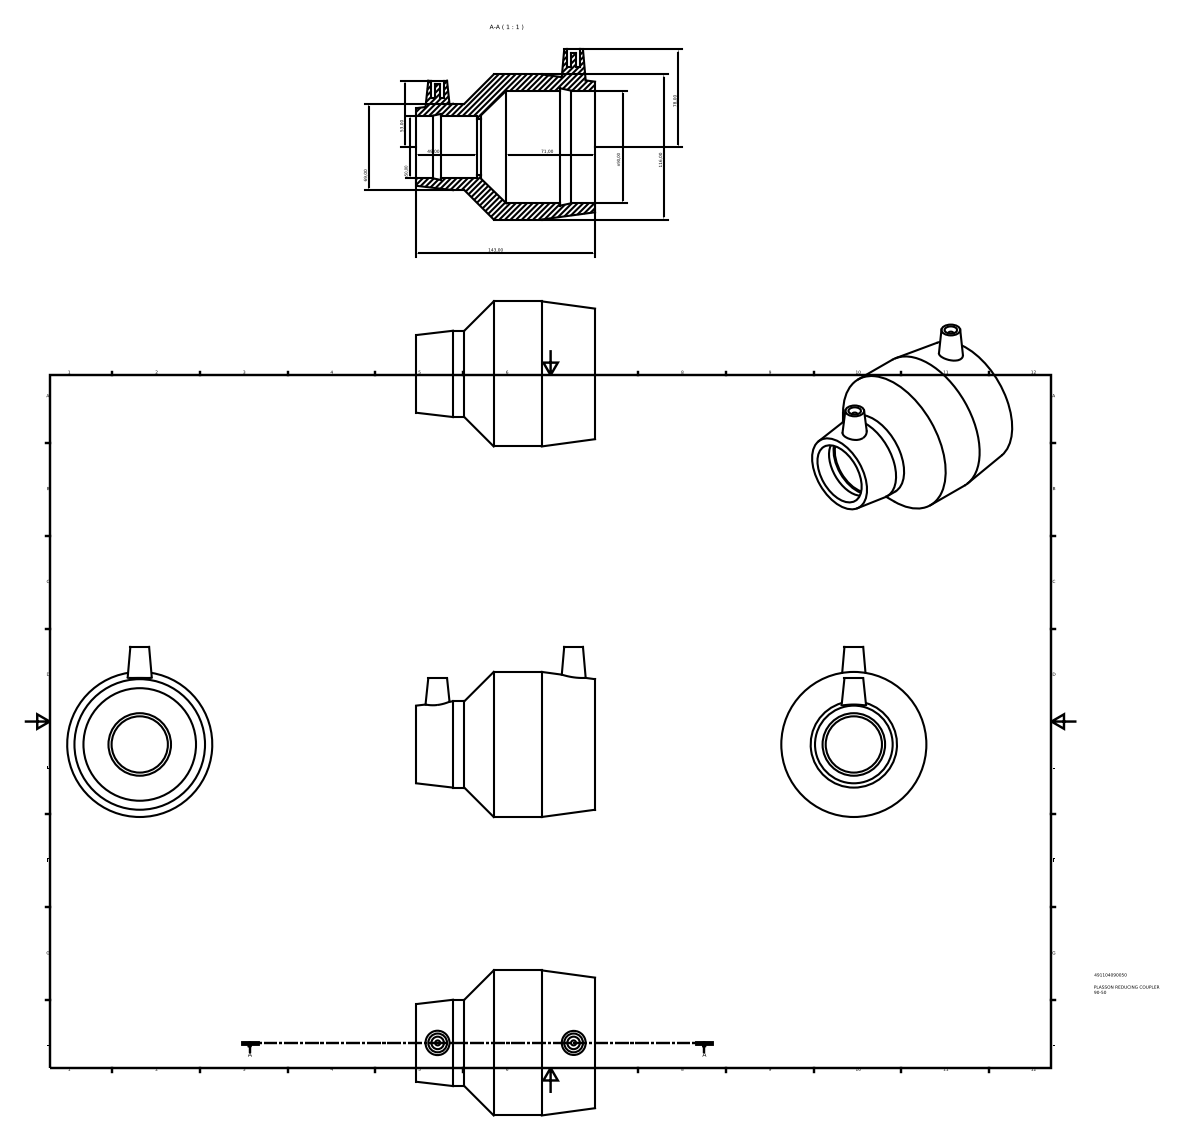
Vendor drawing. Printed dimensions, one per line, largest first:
143,00
116,00
n90,00
78,00
71,00
69,00
53,00
n50,00
49,00
